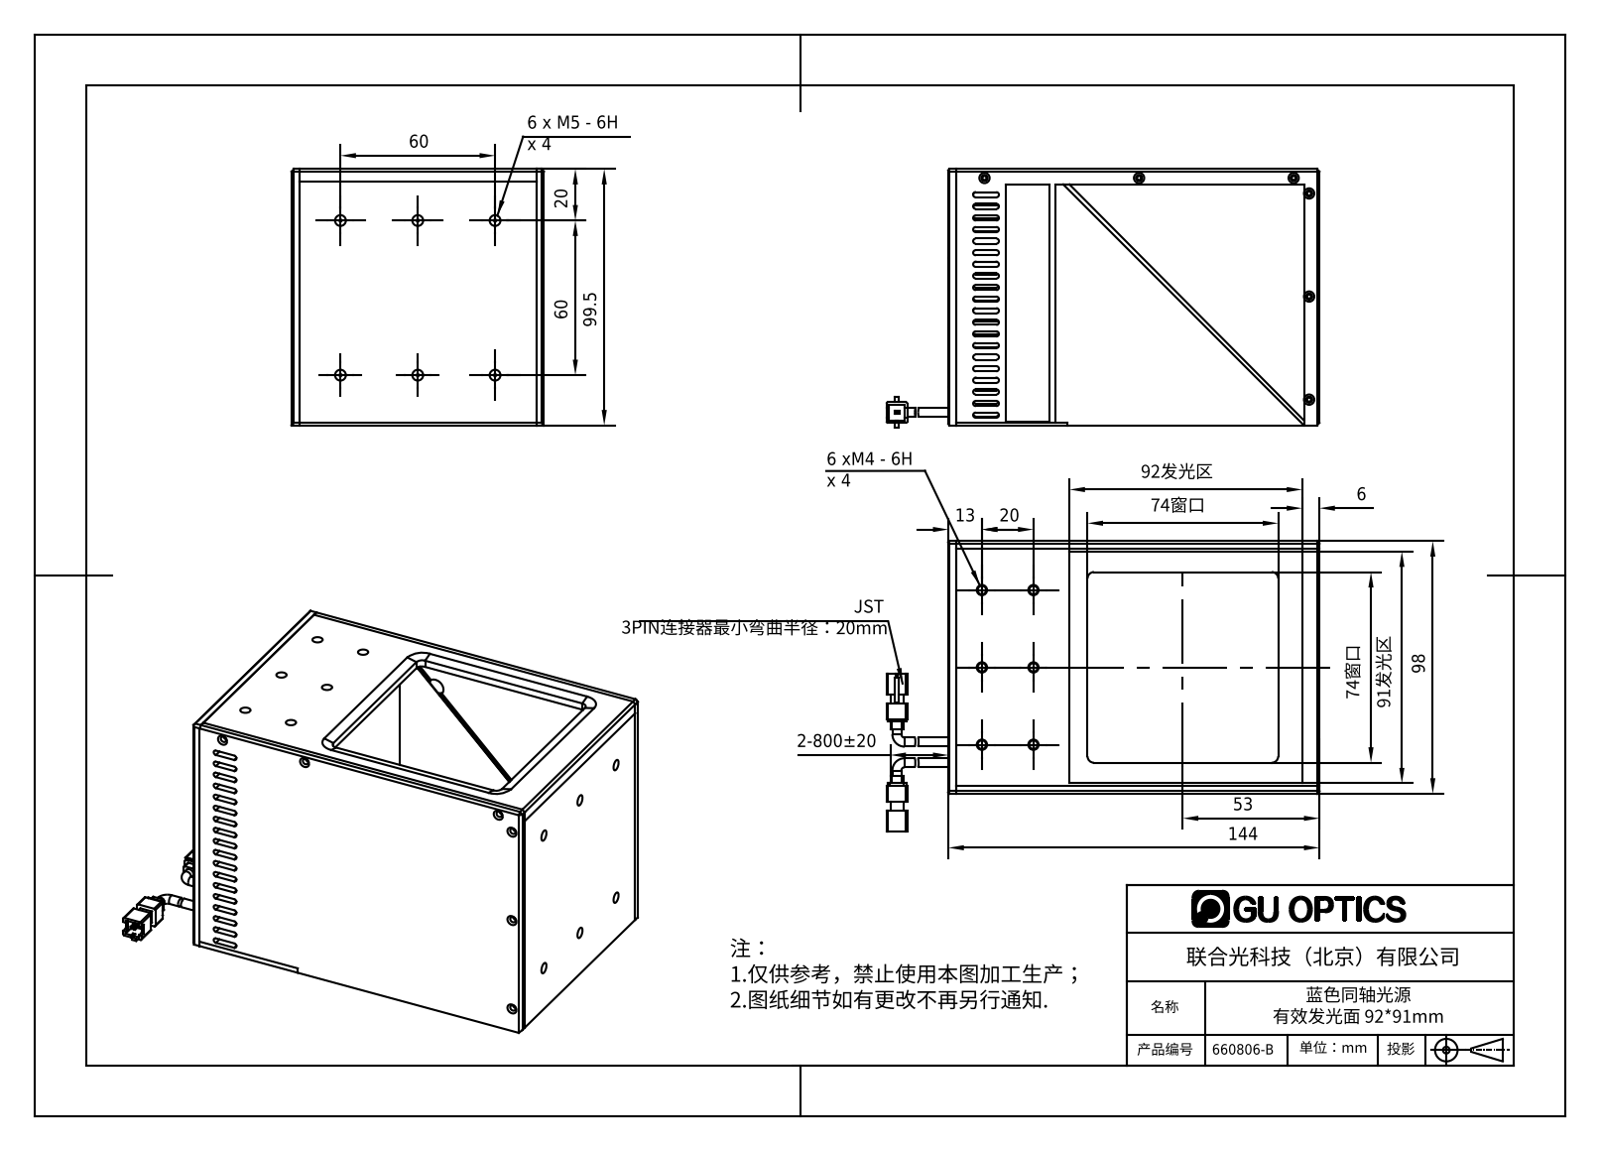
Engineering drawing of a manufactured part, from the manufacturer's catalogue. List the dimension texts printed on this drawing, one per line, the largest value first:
144
99.5
98
92发光区
91发光区
74窗口
74窗口
60
60
53
20
20
13
6
2-800±20
